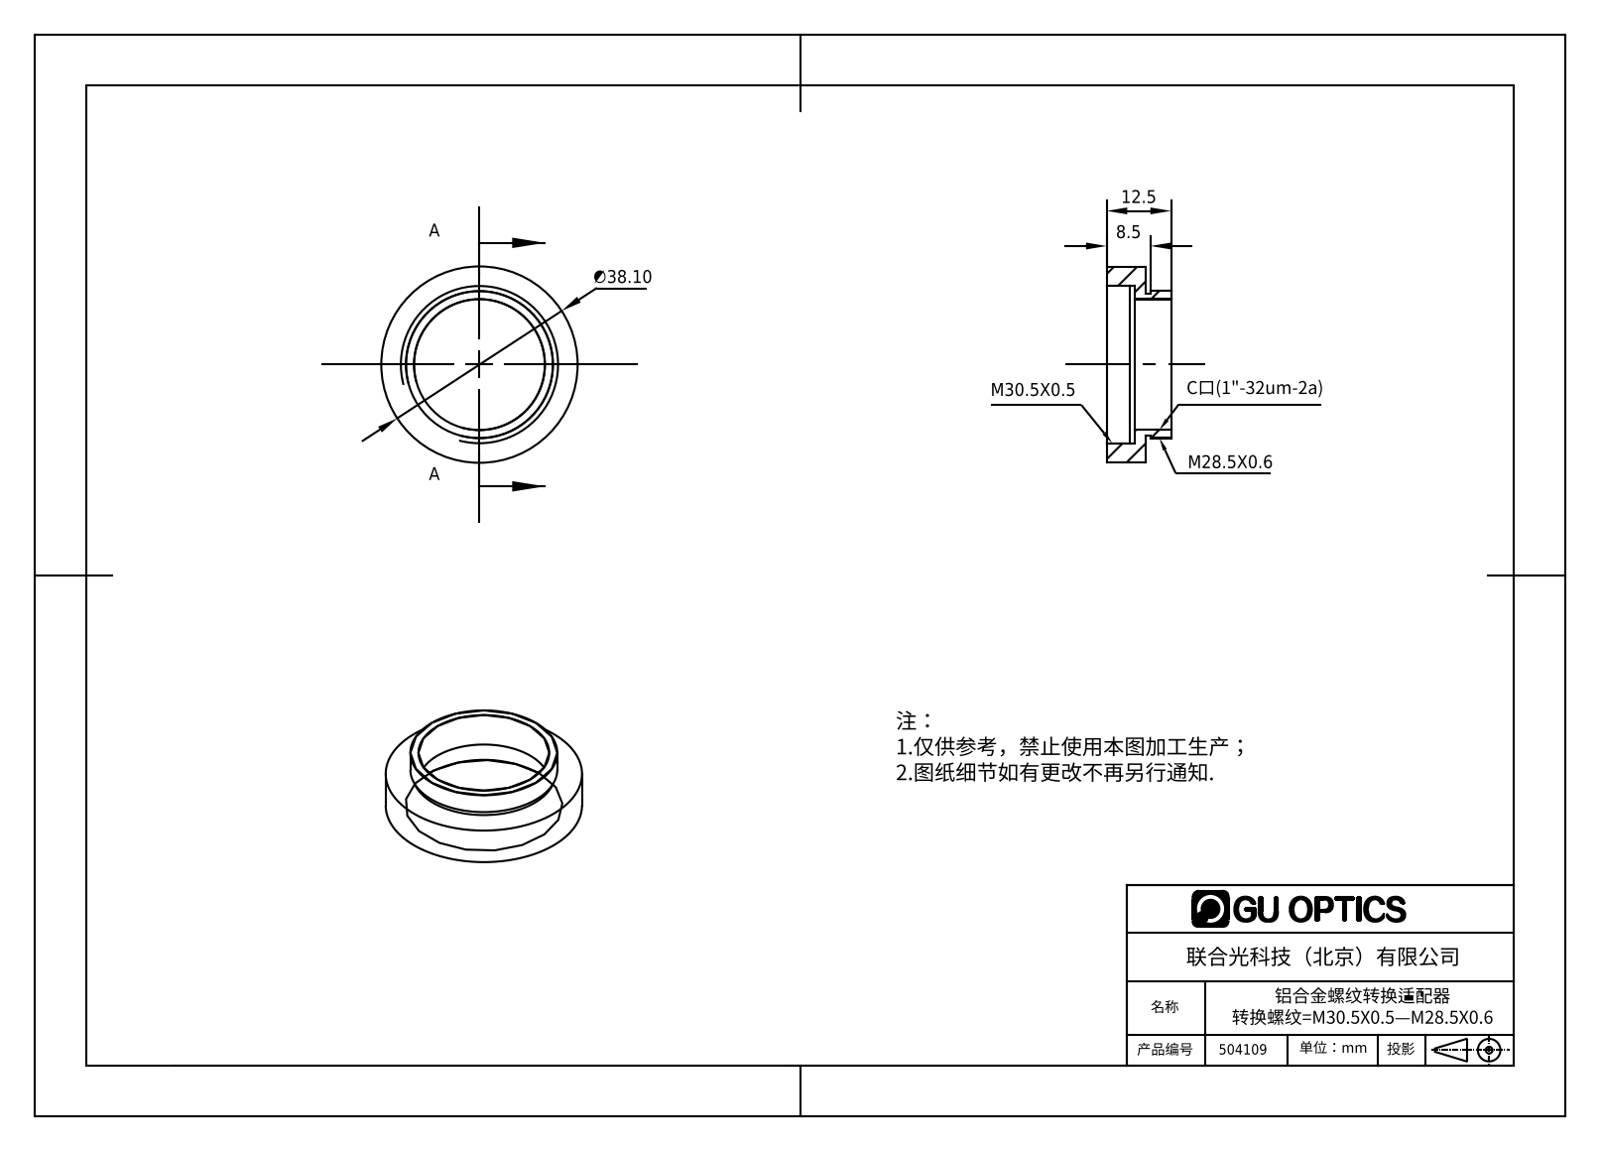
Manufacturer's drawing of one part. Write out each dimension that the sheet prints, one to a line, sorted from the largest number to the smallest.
∅38.10
12.5
8.5
